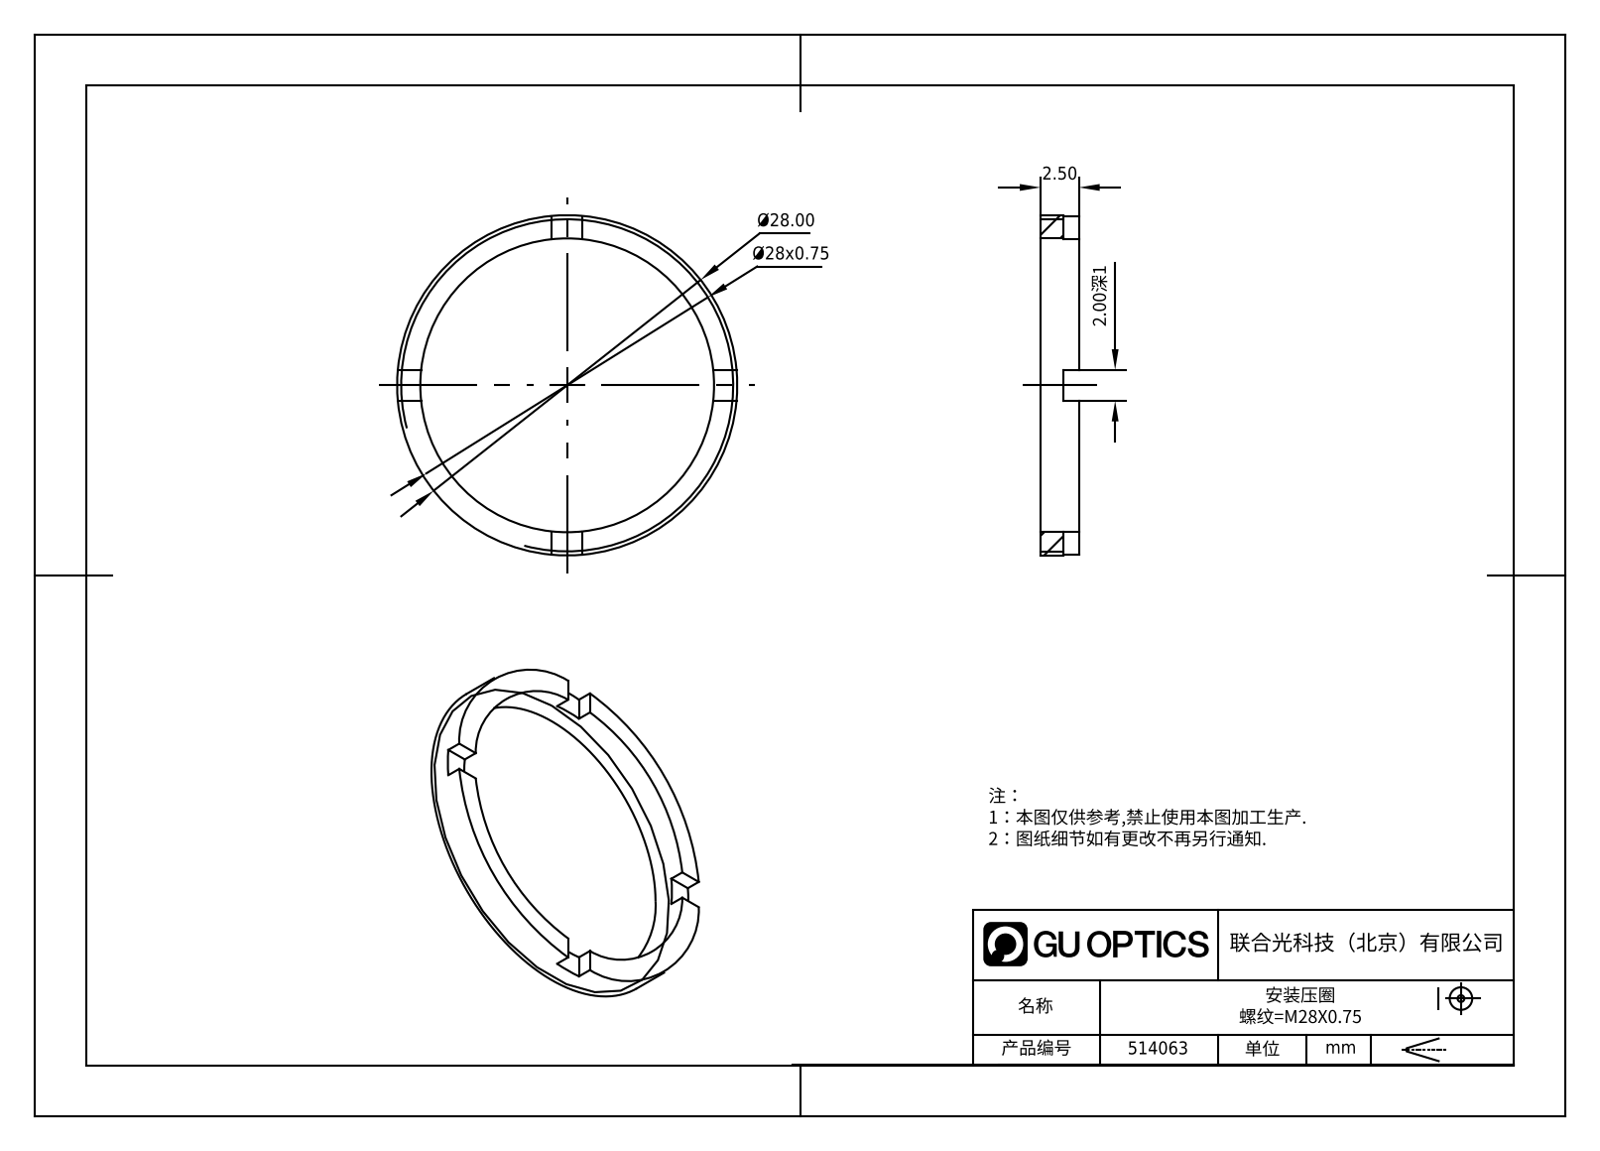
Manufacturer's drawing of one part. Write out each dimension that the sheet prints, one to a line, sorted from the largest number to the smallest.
Ø28.00
Ø28x0.75
2.50
2.00深1
